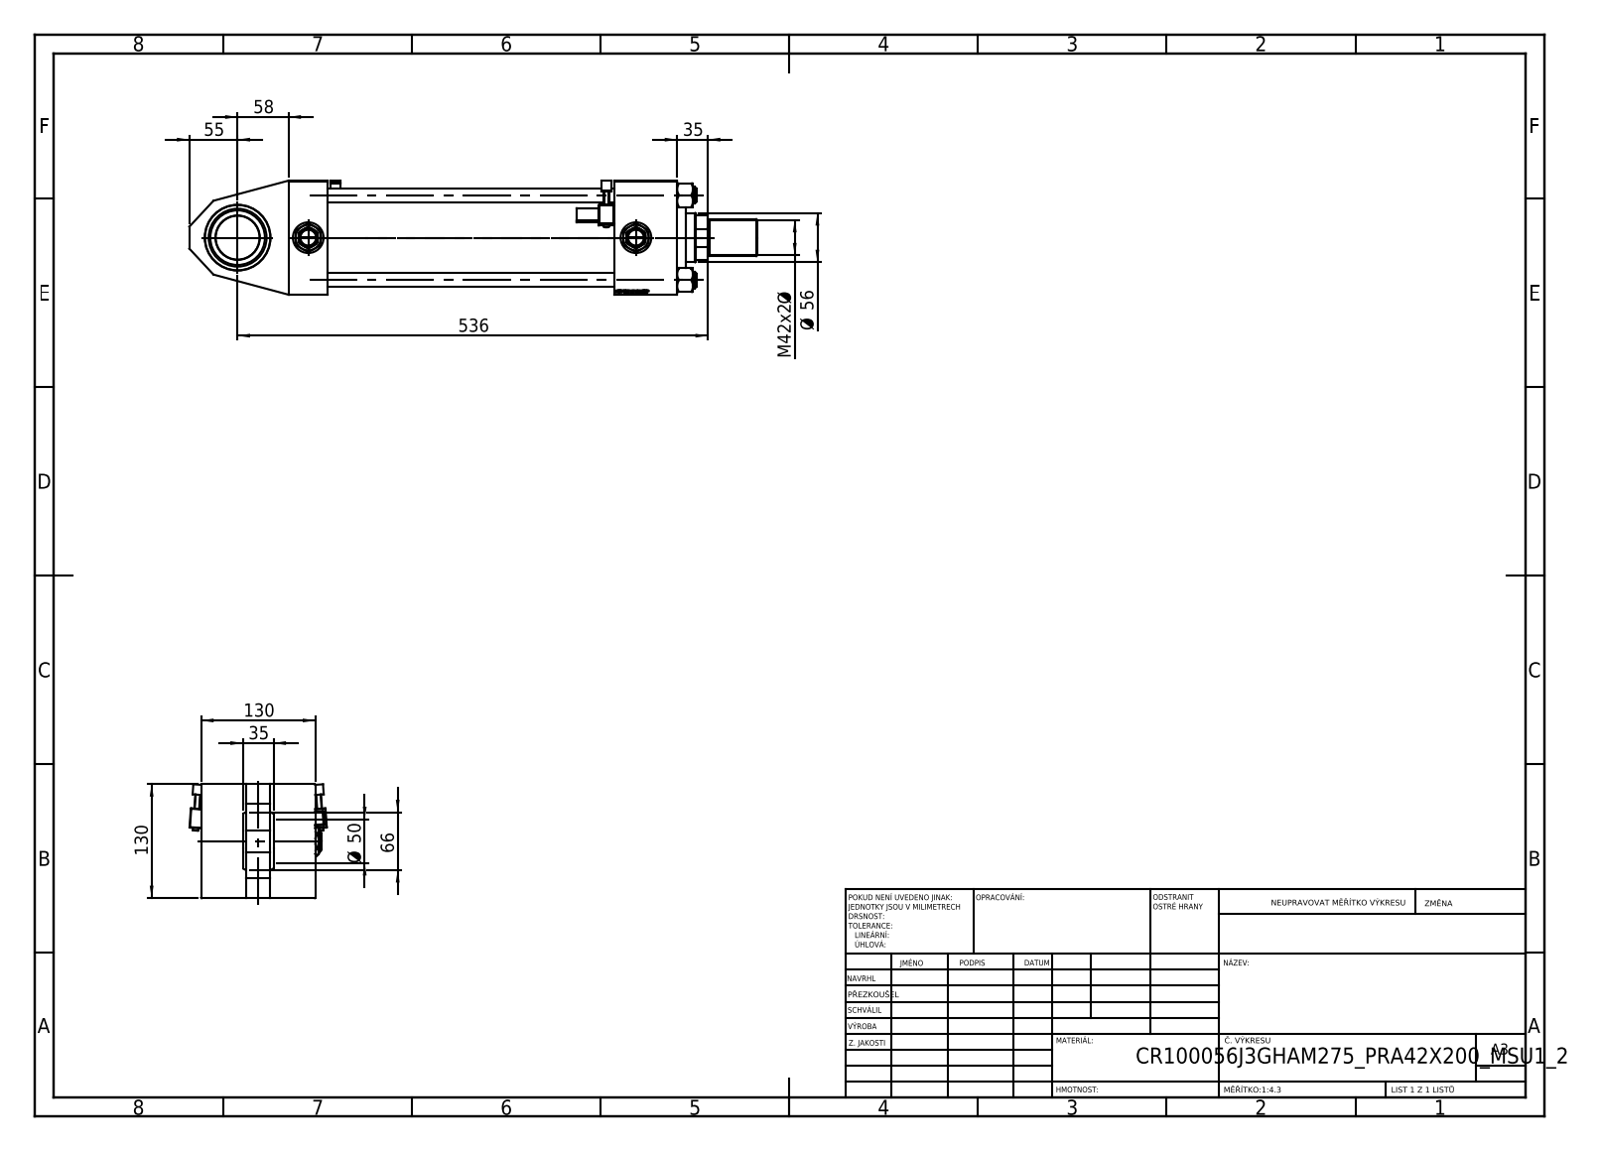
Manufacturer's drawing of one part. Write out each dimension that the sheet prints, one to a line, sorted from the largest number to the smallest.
536
130
130
66
58
Ø 56
55
Ø 50
M42x2 Ø
35
35
